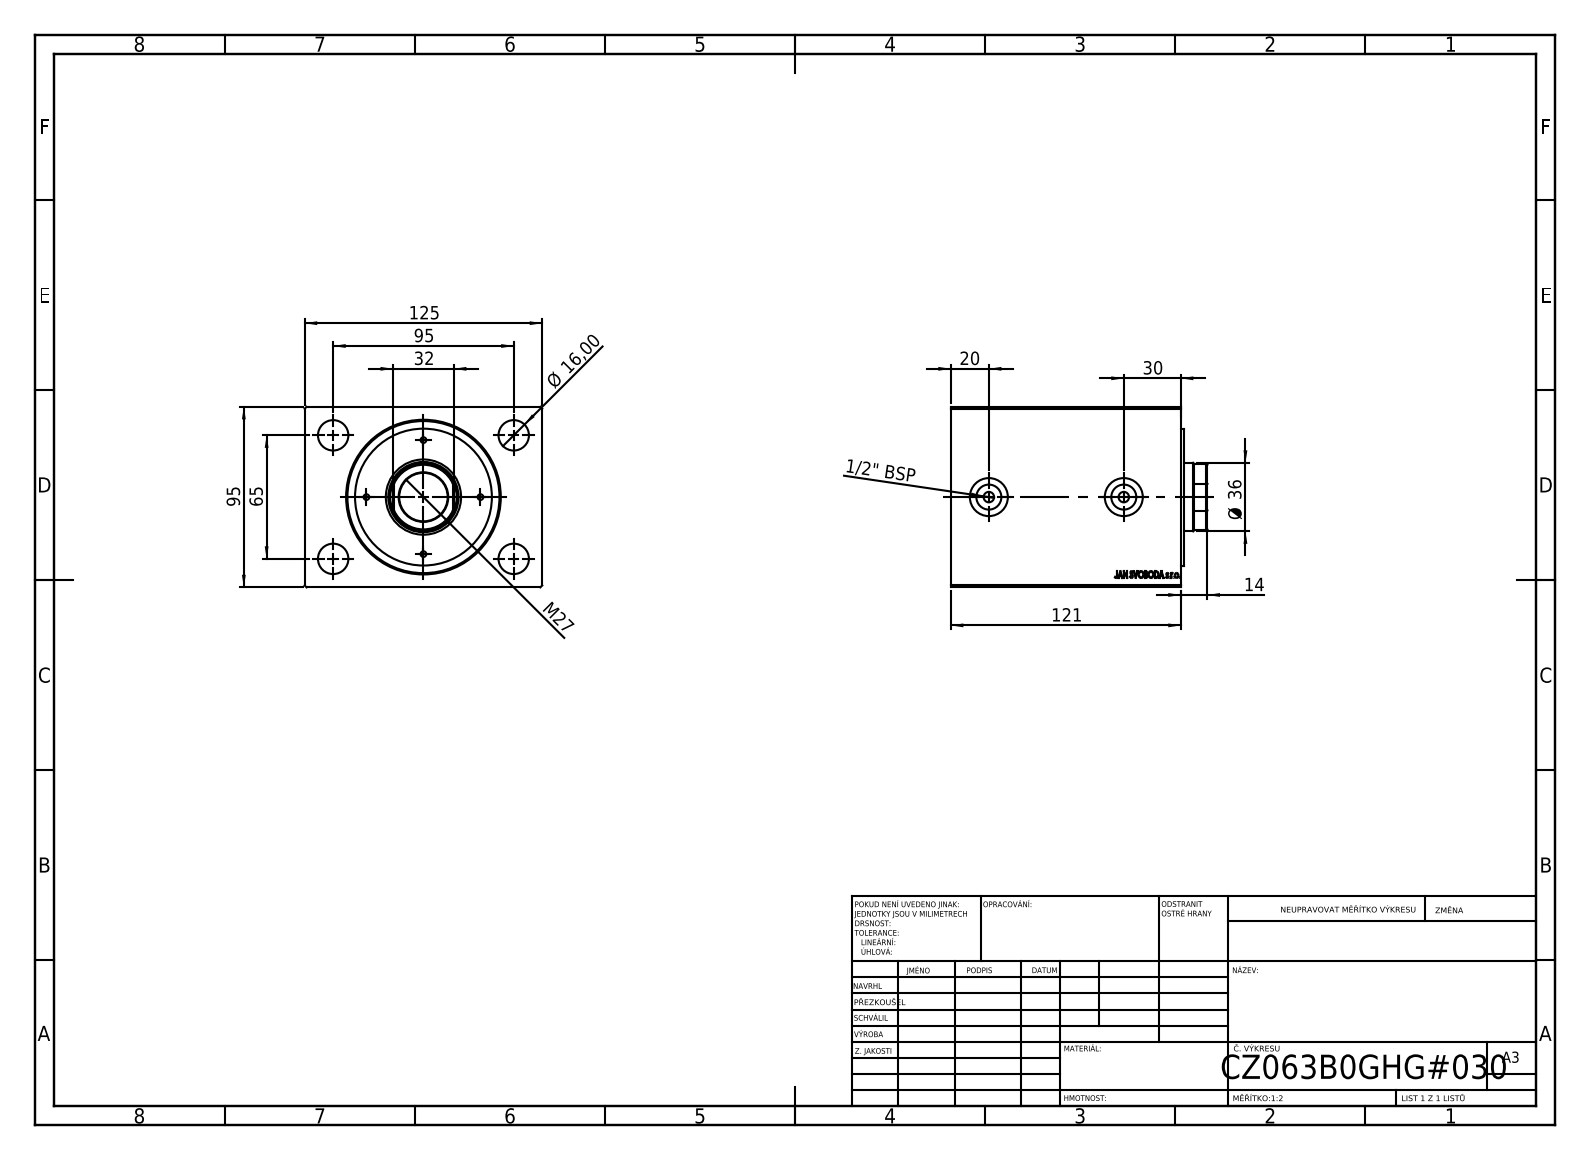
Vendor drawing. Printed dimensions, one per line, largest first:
125
121
95
95
65
Ø 36
32
30
M27
20
Ø 16,00
14
1/2" BSP
